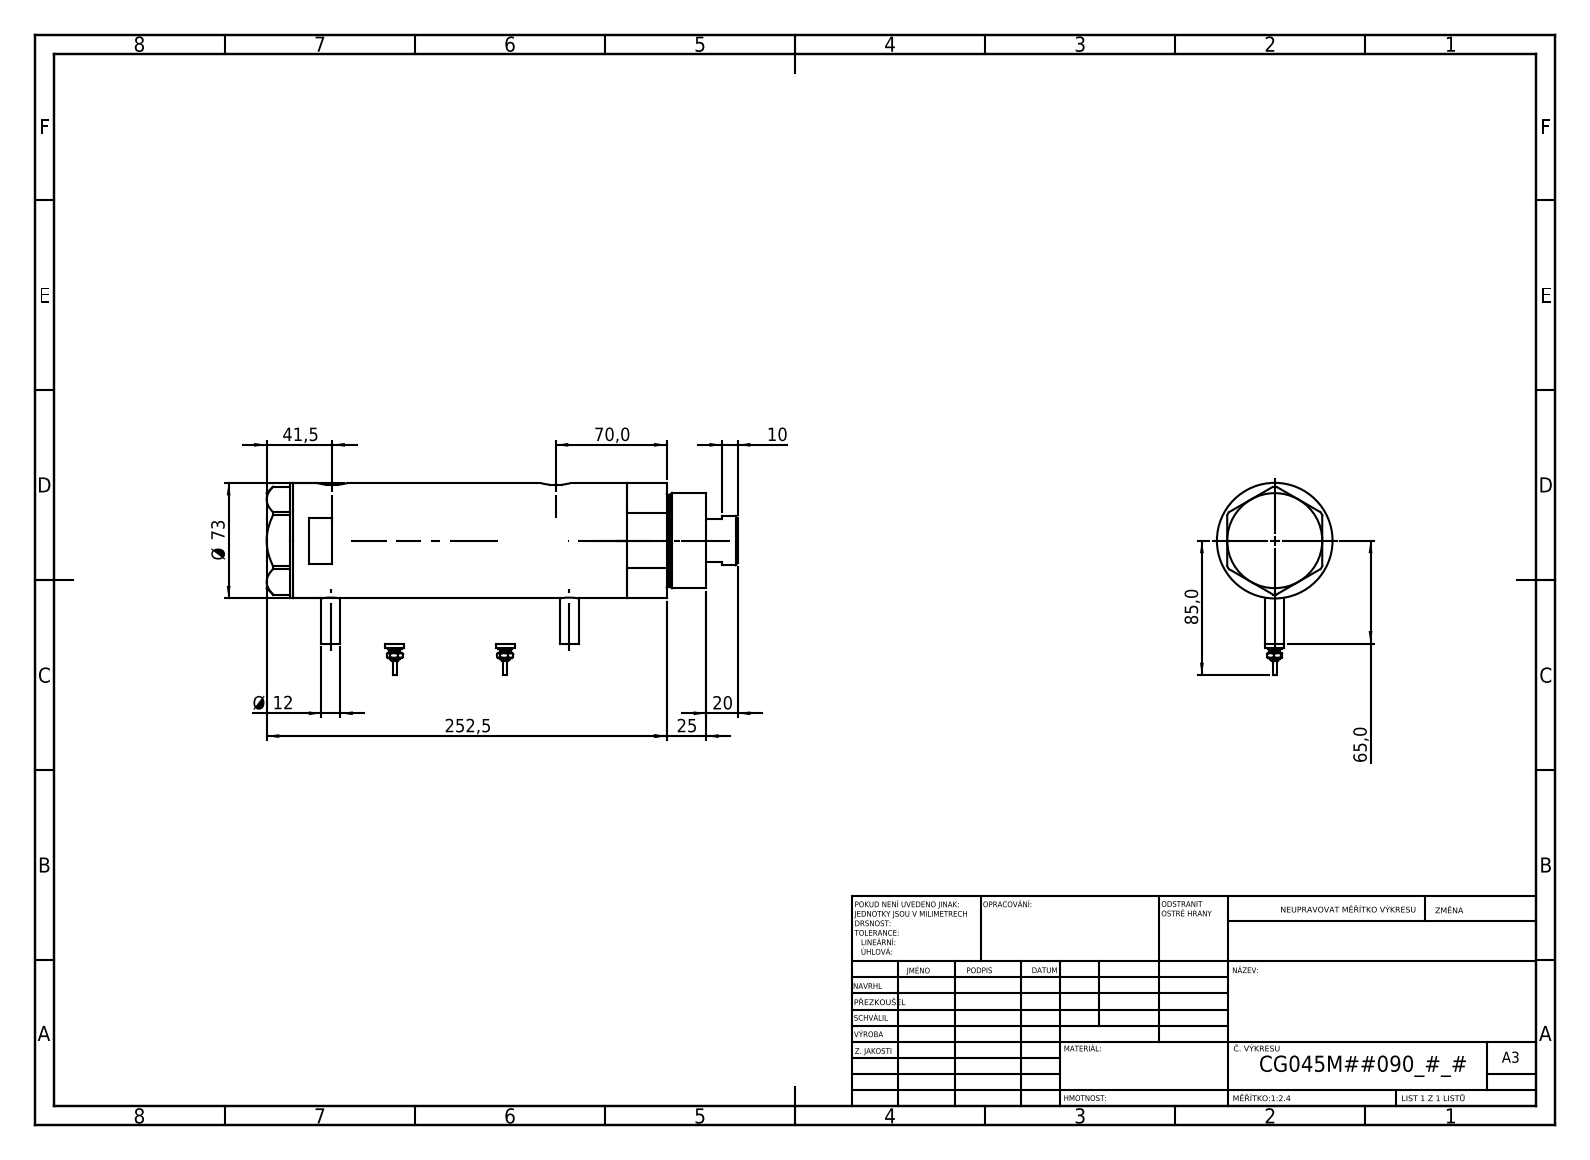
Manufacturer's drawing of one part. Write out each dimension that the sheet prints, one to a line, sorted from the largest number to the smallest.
252,5
85,0
Ø 73
70,0
65,0
41,5
25
20
Ø 12
10
